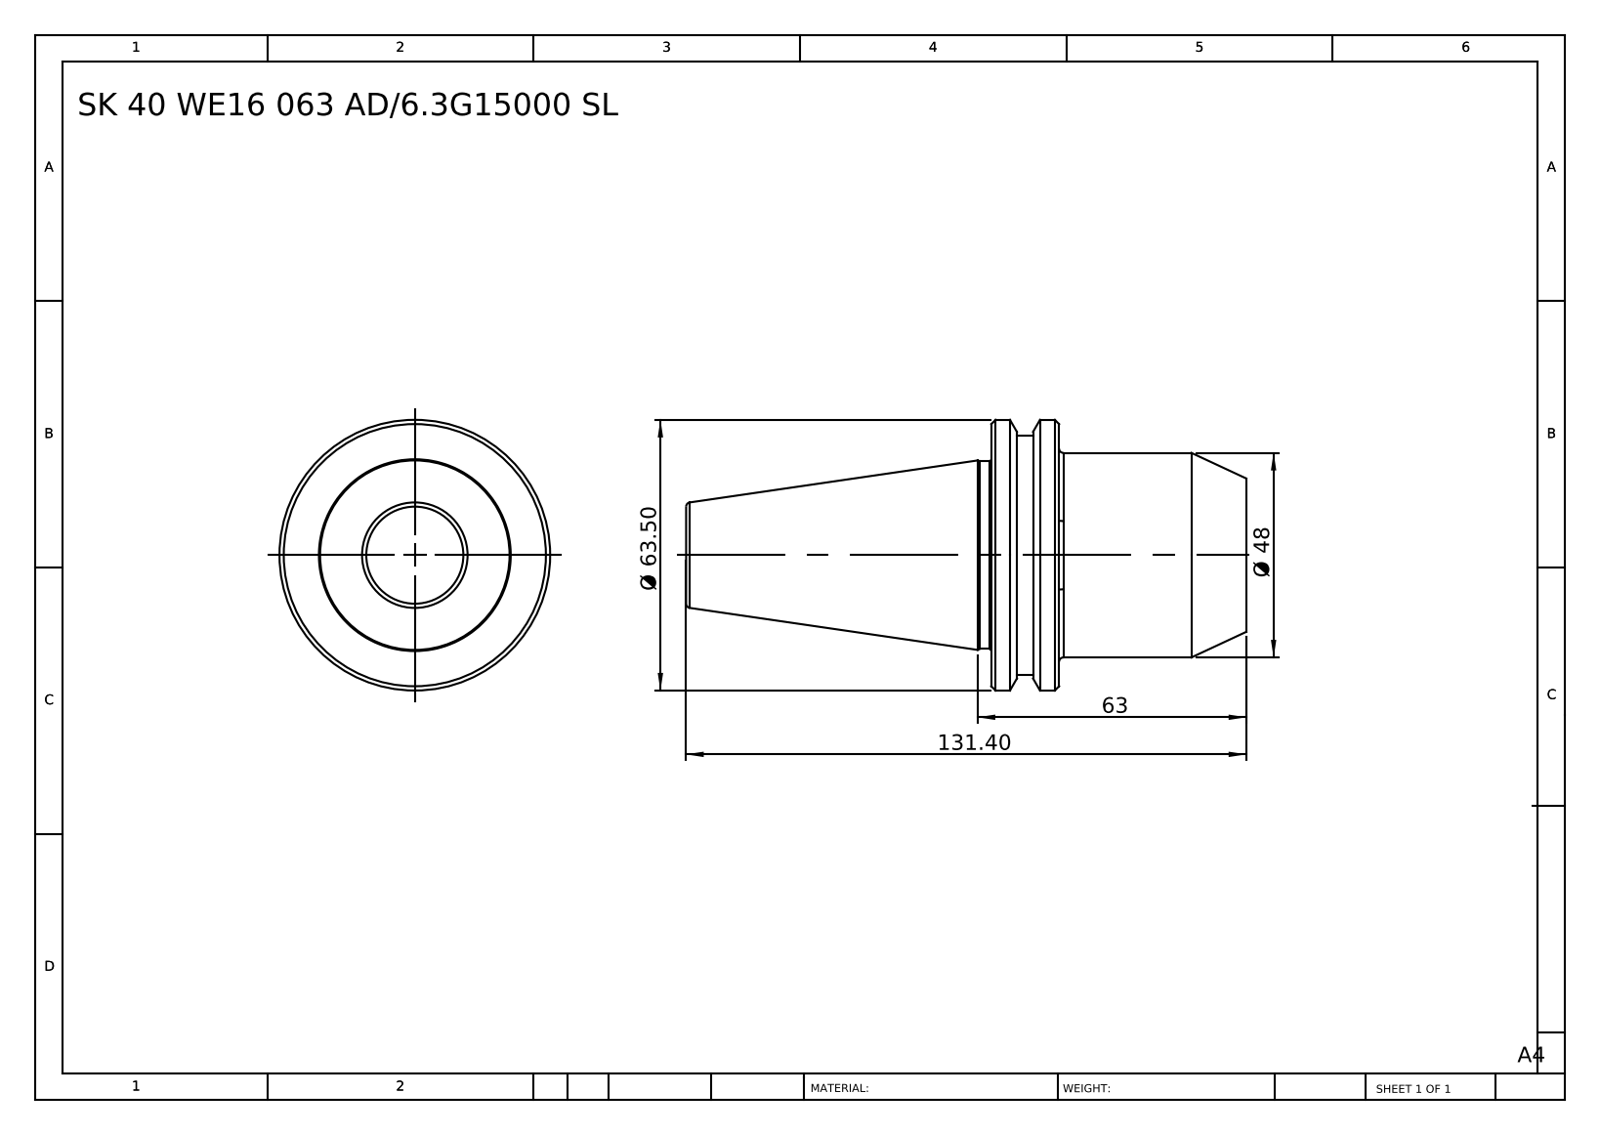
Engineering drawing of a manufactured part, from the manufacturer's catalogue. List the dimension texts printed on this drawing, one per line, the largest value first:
131.40
Ø 63.50
63
Ø 48
